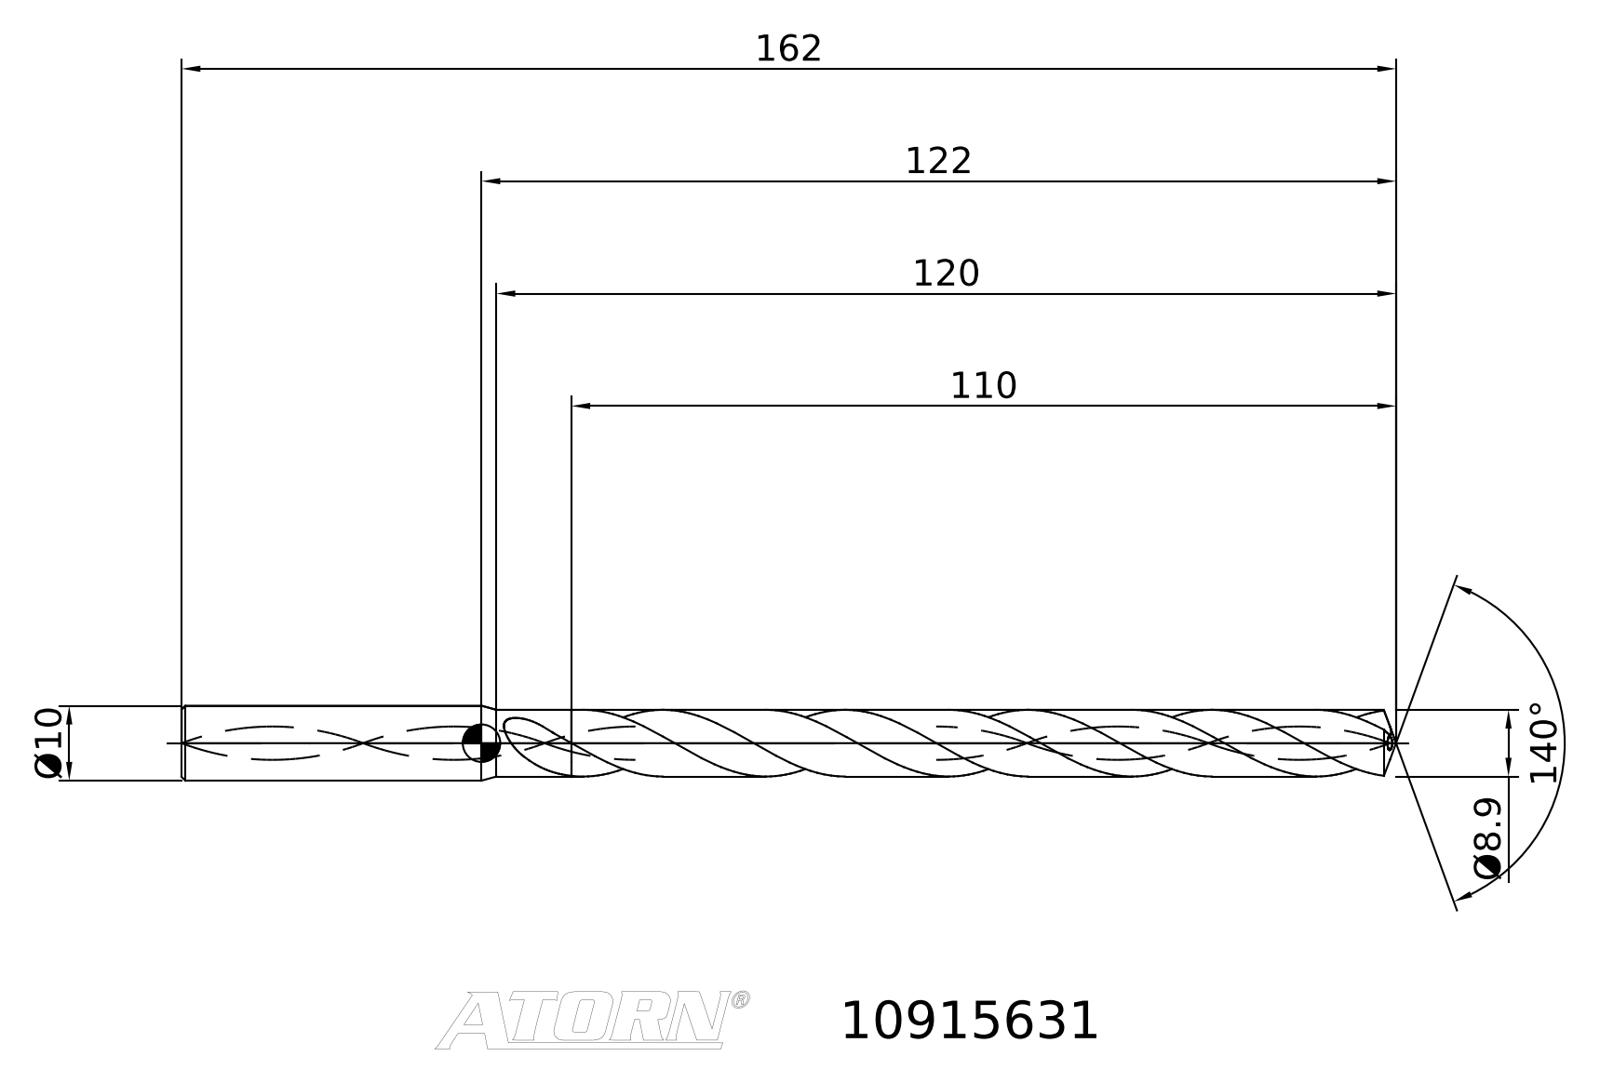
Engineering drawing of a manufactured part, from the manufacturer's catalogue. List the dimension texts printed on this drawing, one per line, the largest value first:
162
140°
122
120
110
Ø10
Ø8.9
